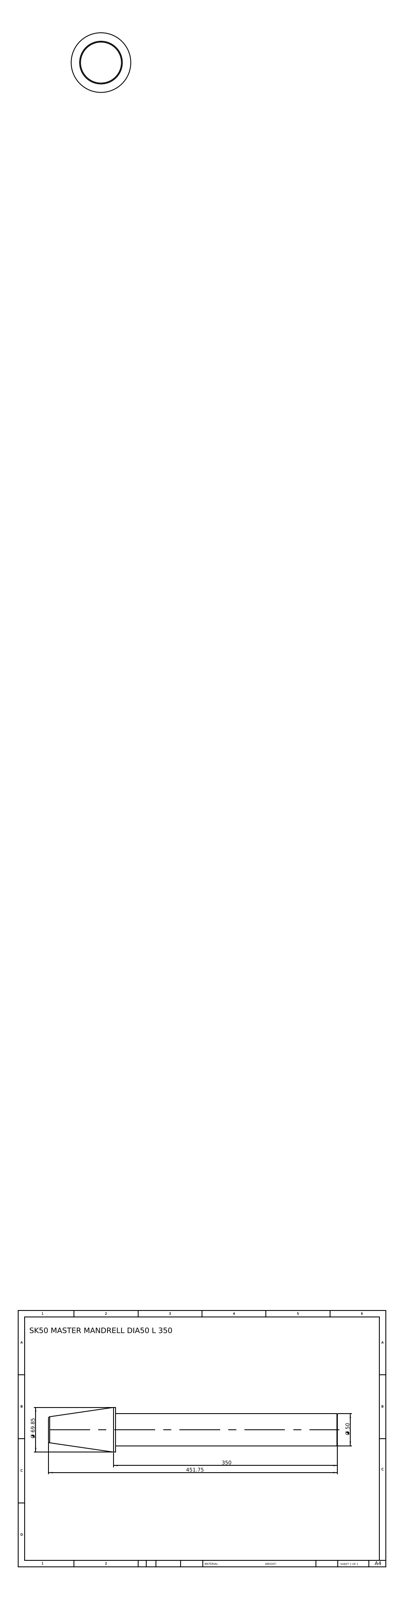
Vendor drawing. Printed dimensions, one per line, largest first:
451.75
350
Ø 69.85
Ø 50
